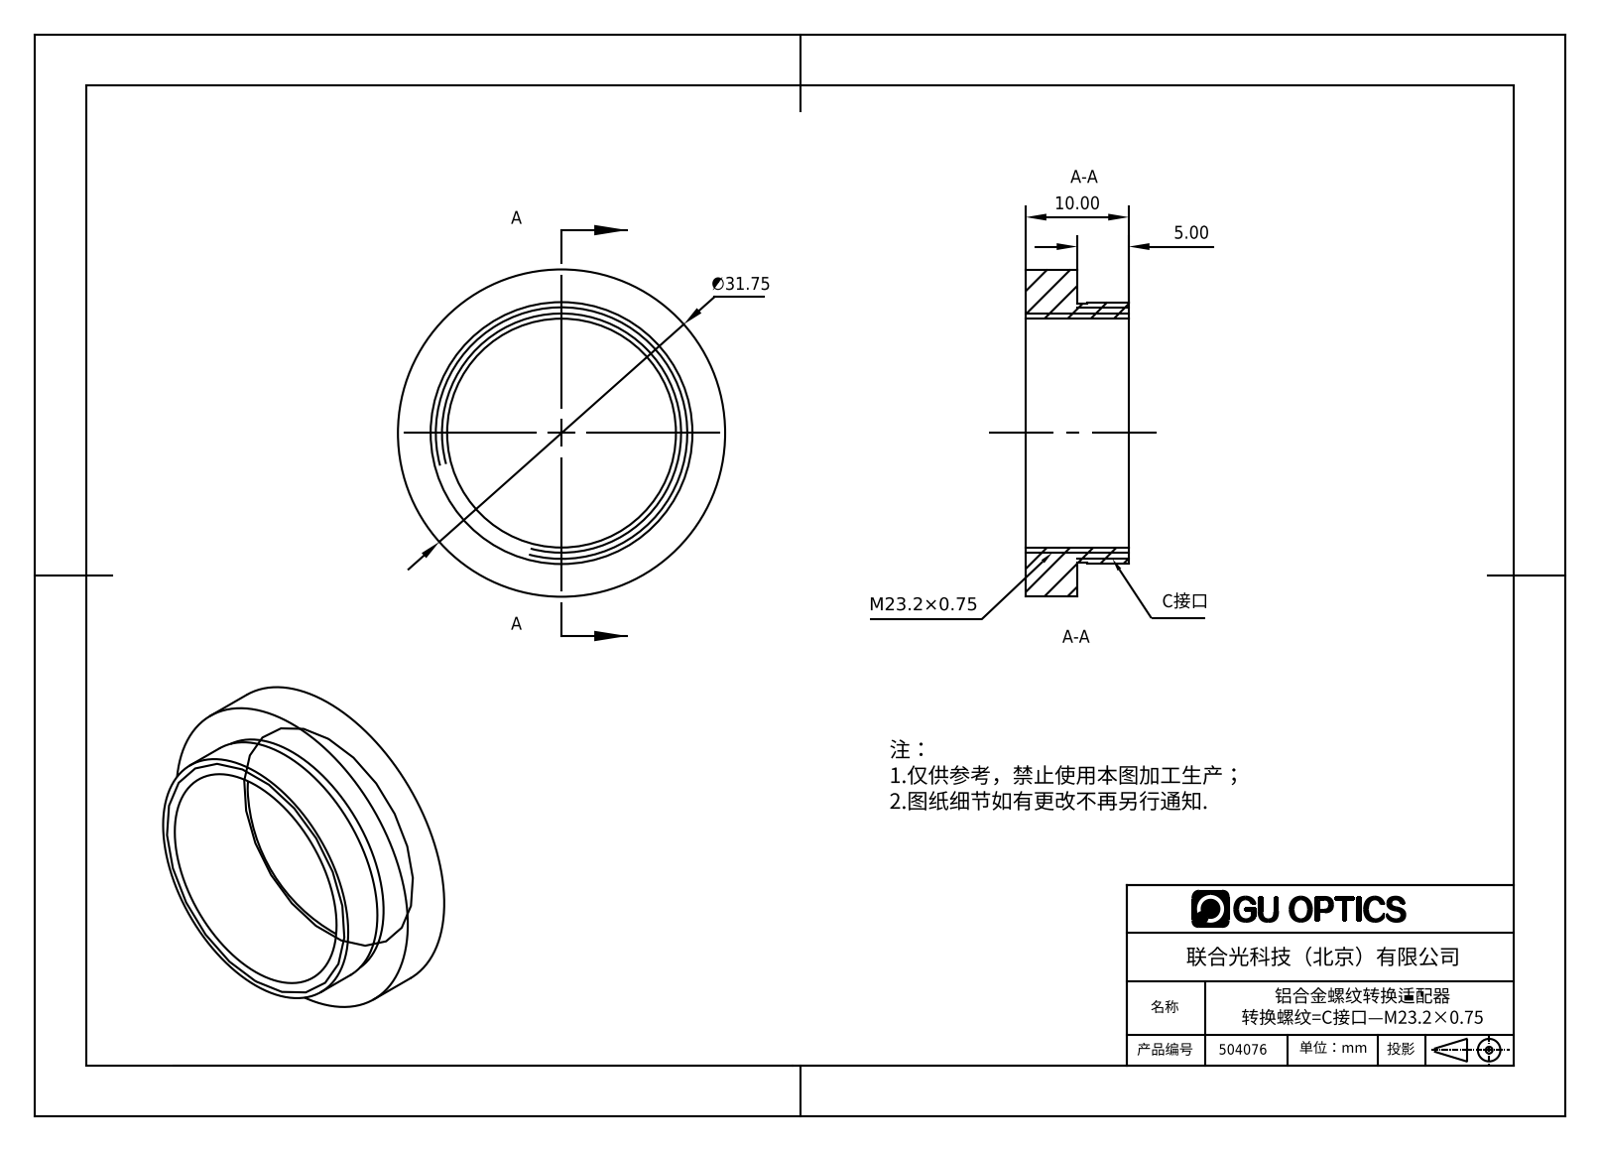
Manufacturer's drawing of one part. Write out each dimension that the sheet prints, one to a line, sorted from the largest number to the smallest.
∅31.75
10.00
5.00
